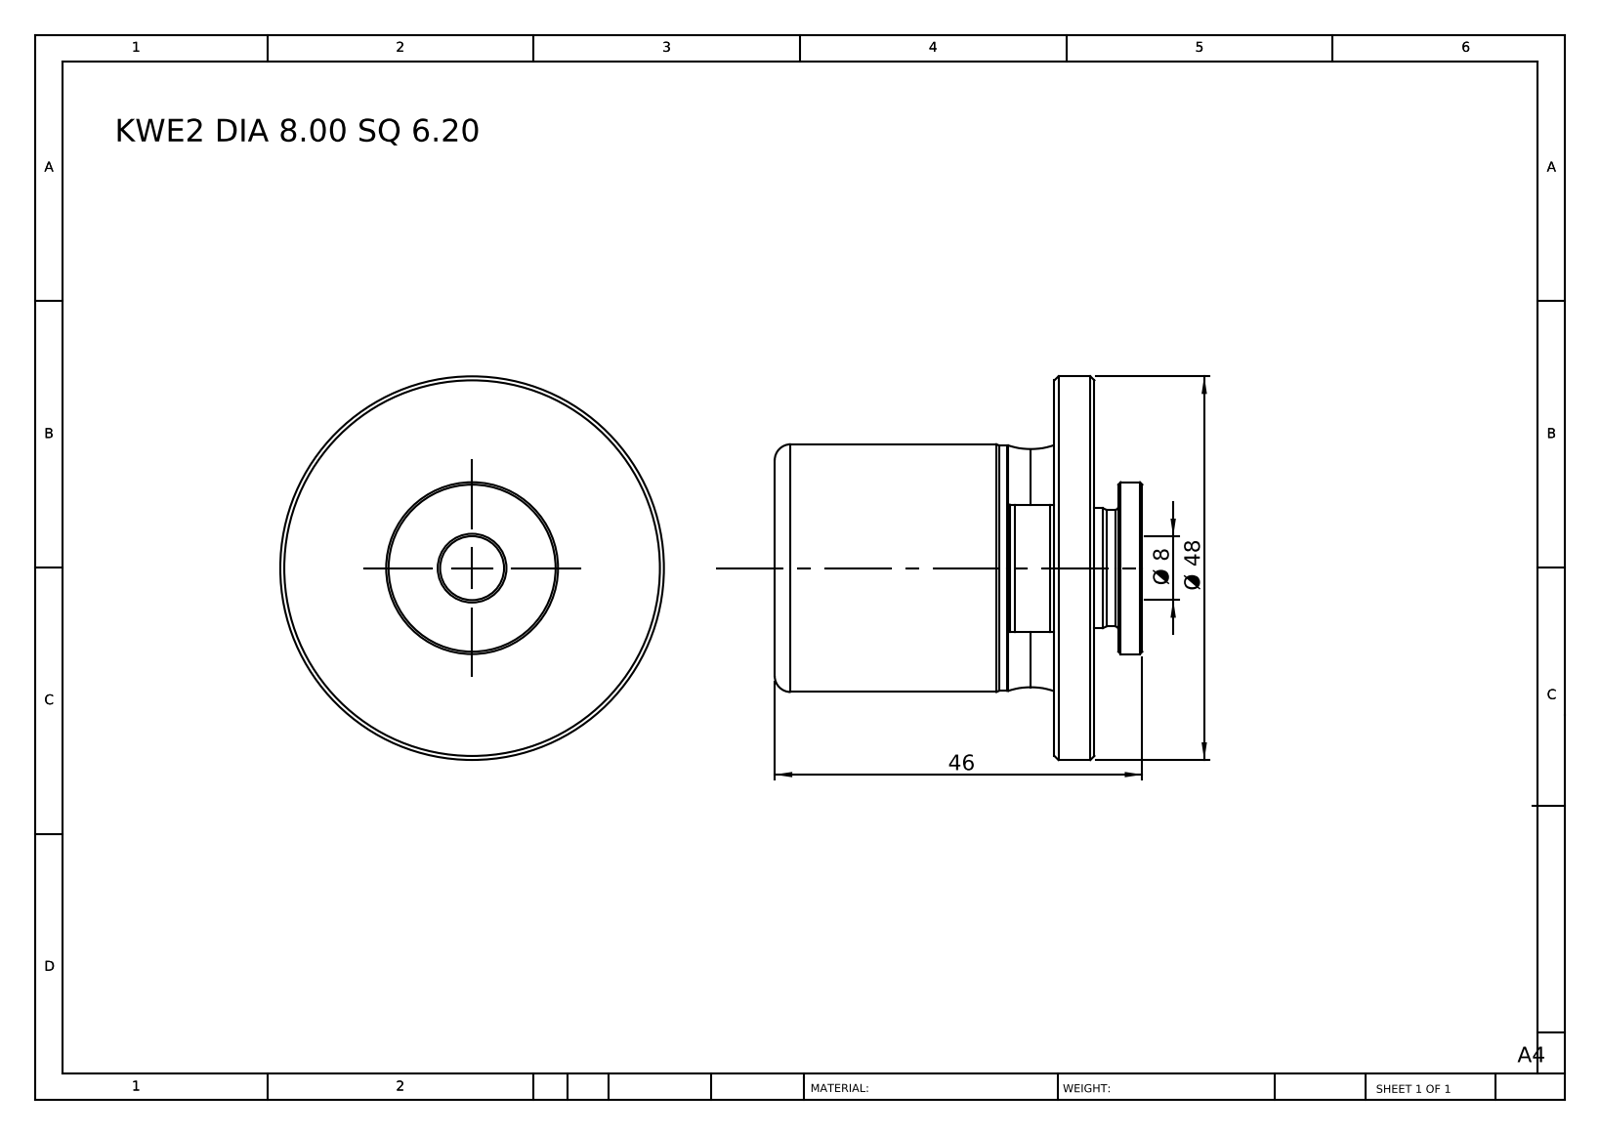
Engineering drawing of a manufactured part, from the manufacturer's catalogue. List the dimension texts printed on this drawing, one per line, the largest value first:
Ø 48
46
Ø 8
